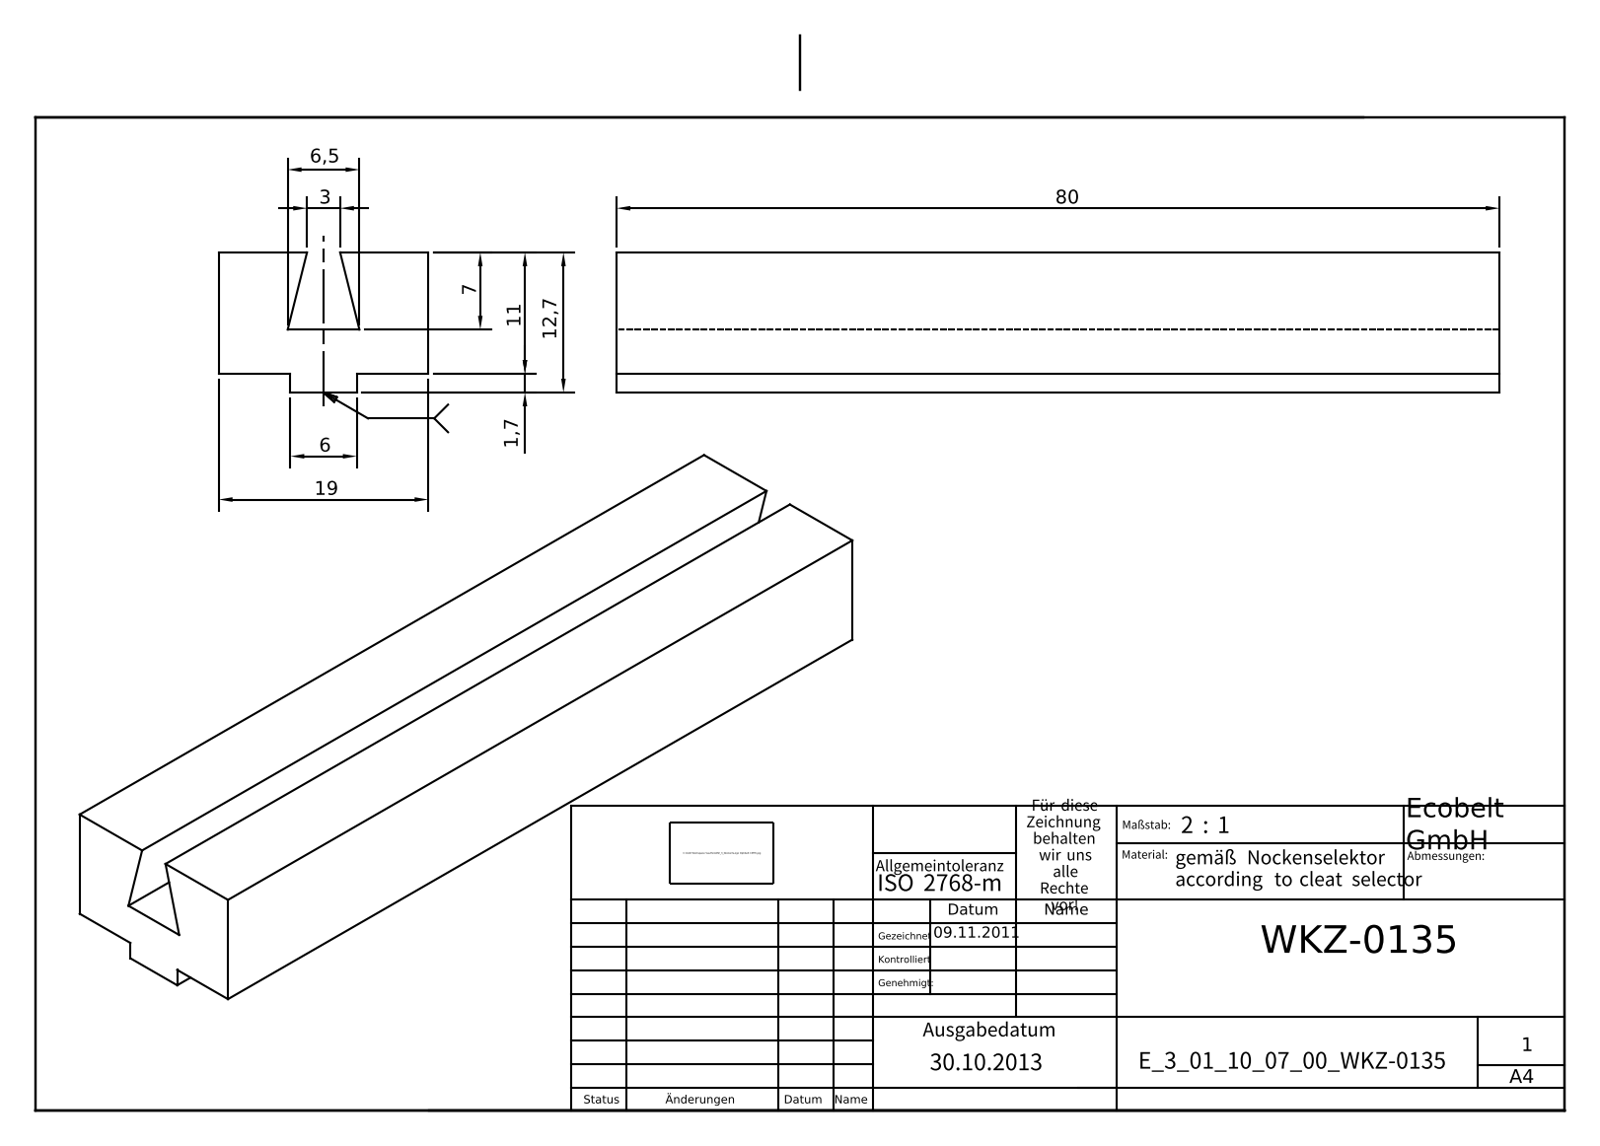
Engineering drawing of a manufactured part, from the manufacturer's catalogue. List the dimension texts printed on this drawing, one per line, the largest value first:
80
19
12,7
11
7
6,5
6
3
1,7
